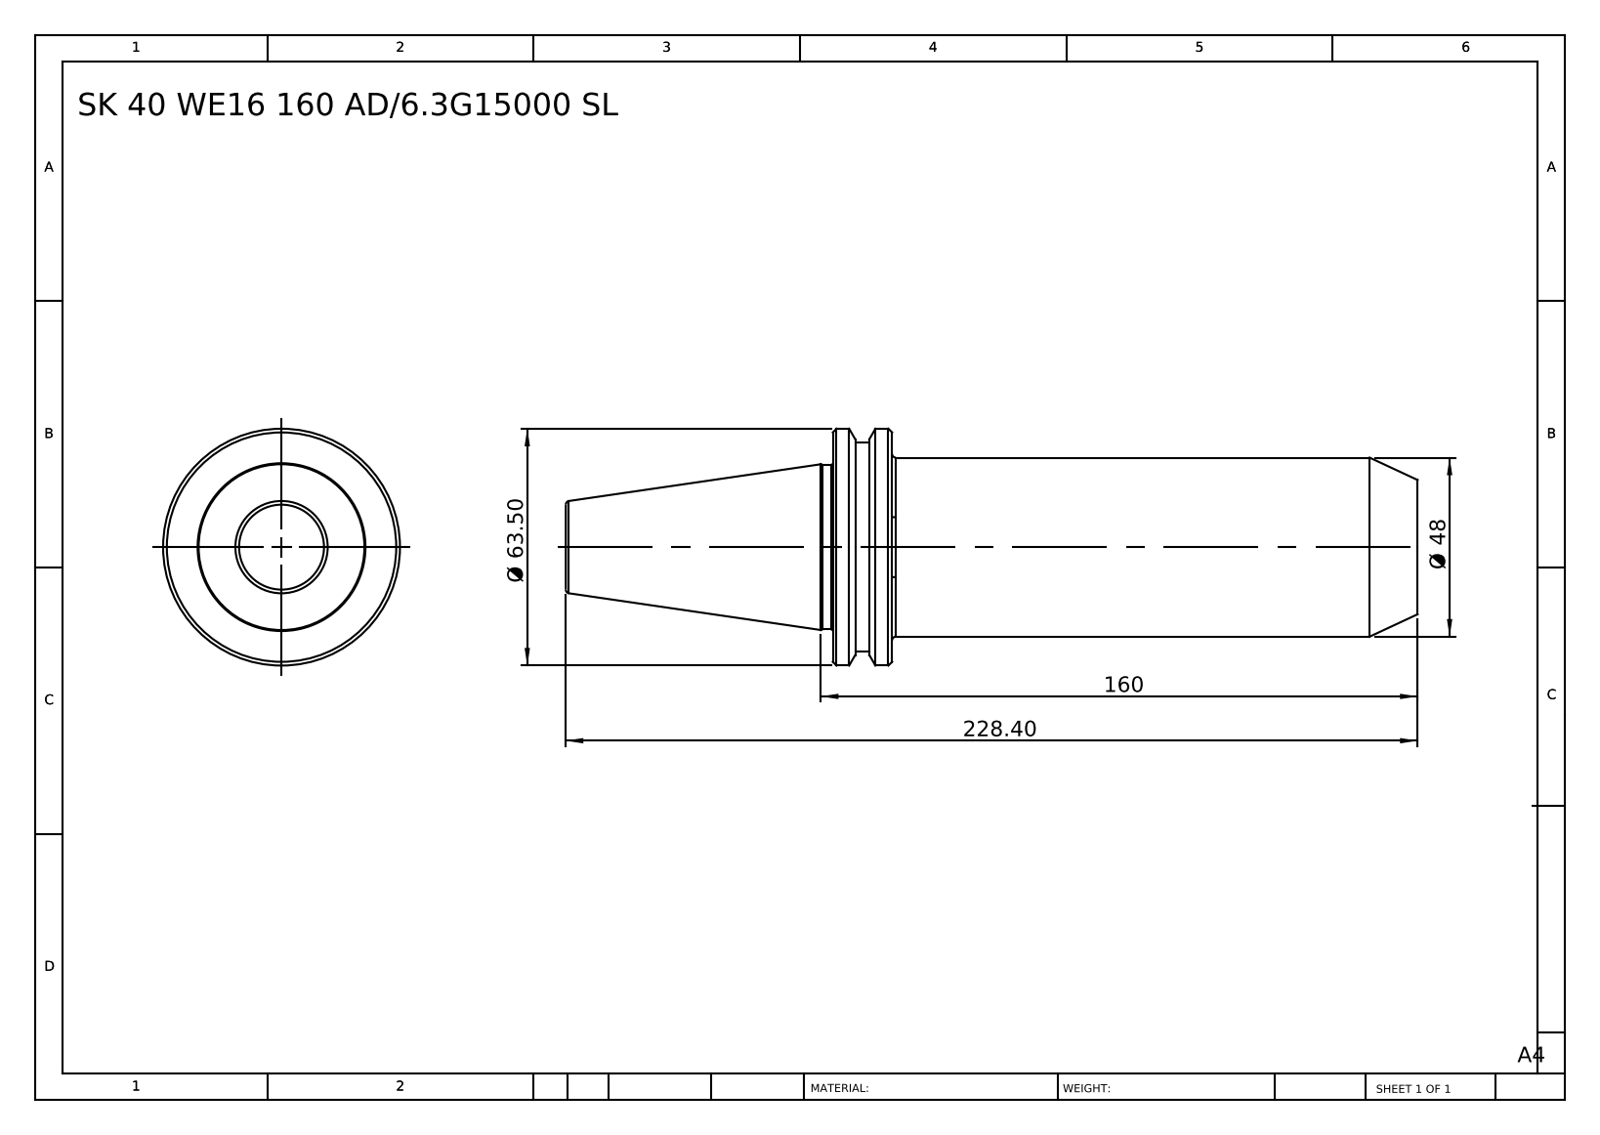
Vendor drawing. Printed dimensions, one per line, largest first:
228.40
160
Ø 63.50
Ø 48
